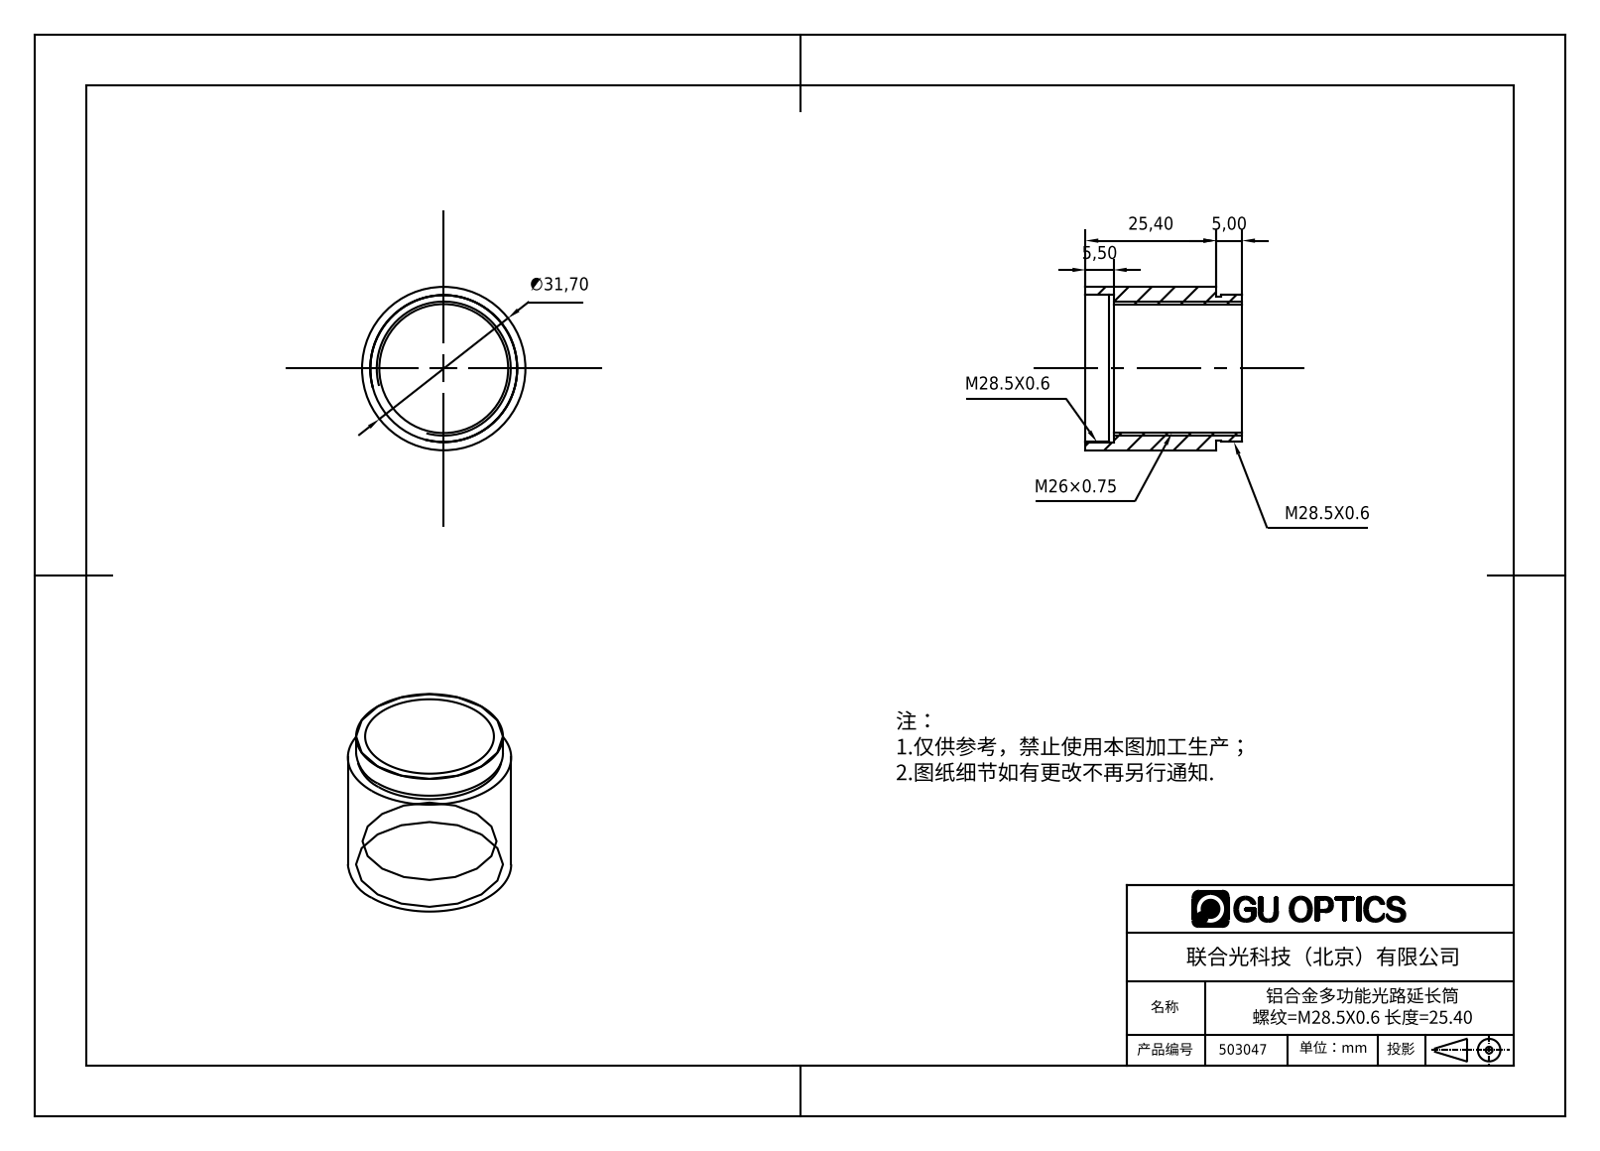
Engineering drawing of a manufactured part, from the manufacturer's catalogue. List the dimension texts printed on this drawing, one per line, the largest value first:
∅31,70
25,40
5,50
5,00
